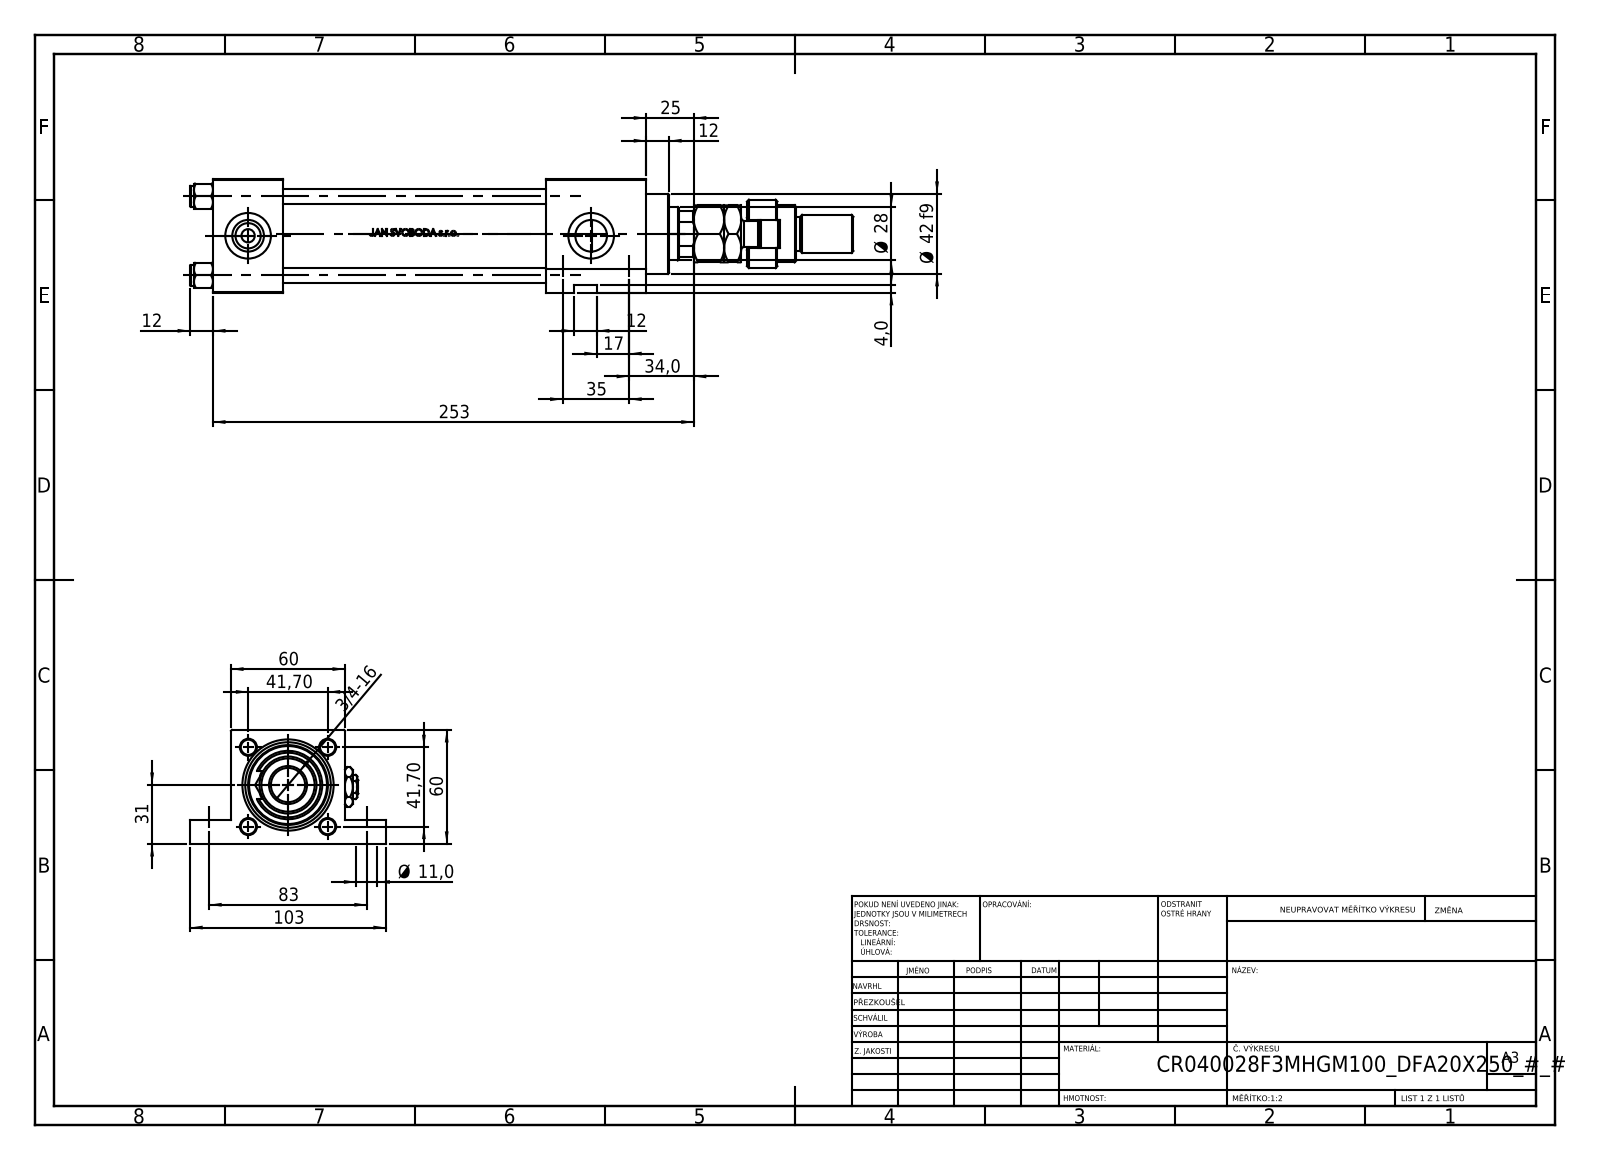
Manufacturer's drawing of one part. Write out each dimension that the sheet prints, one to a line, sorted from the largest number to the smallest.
253
103
83
60
60
Ø 42 f9
41,70
41,70
35
34,0
31
Ø 28
25
17
12
12
12
Ø 11,0
4,0
3/4-16
